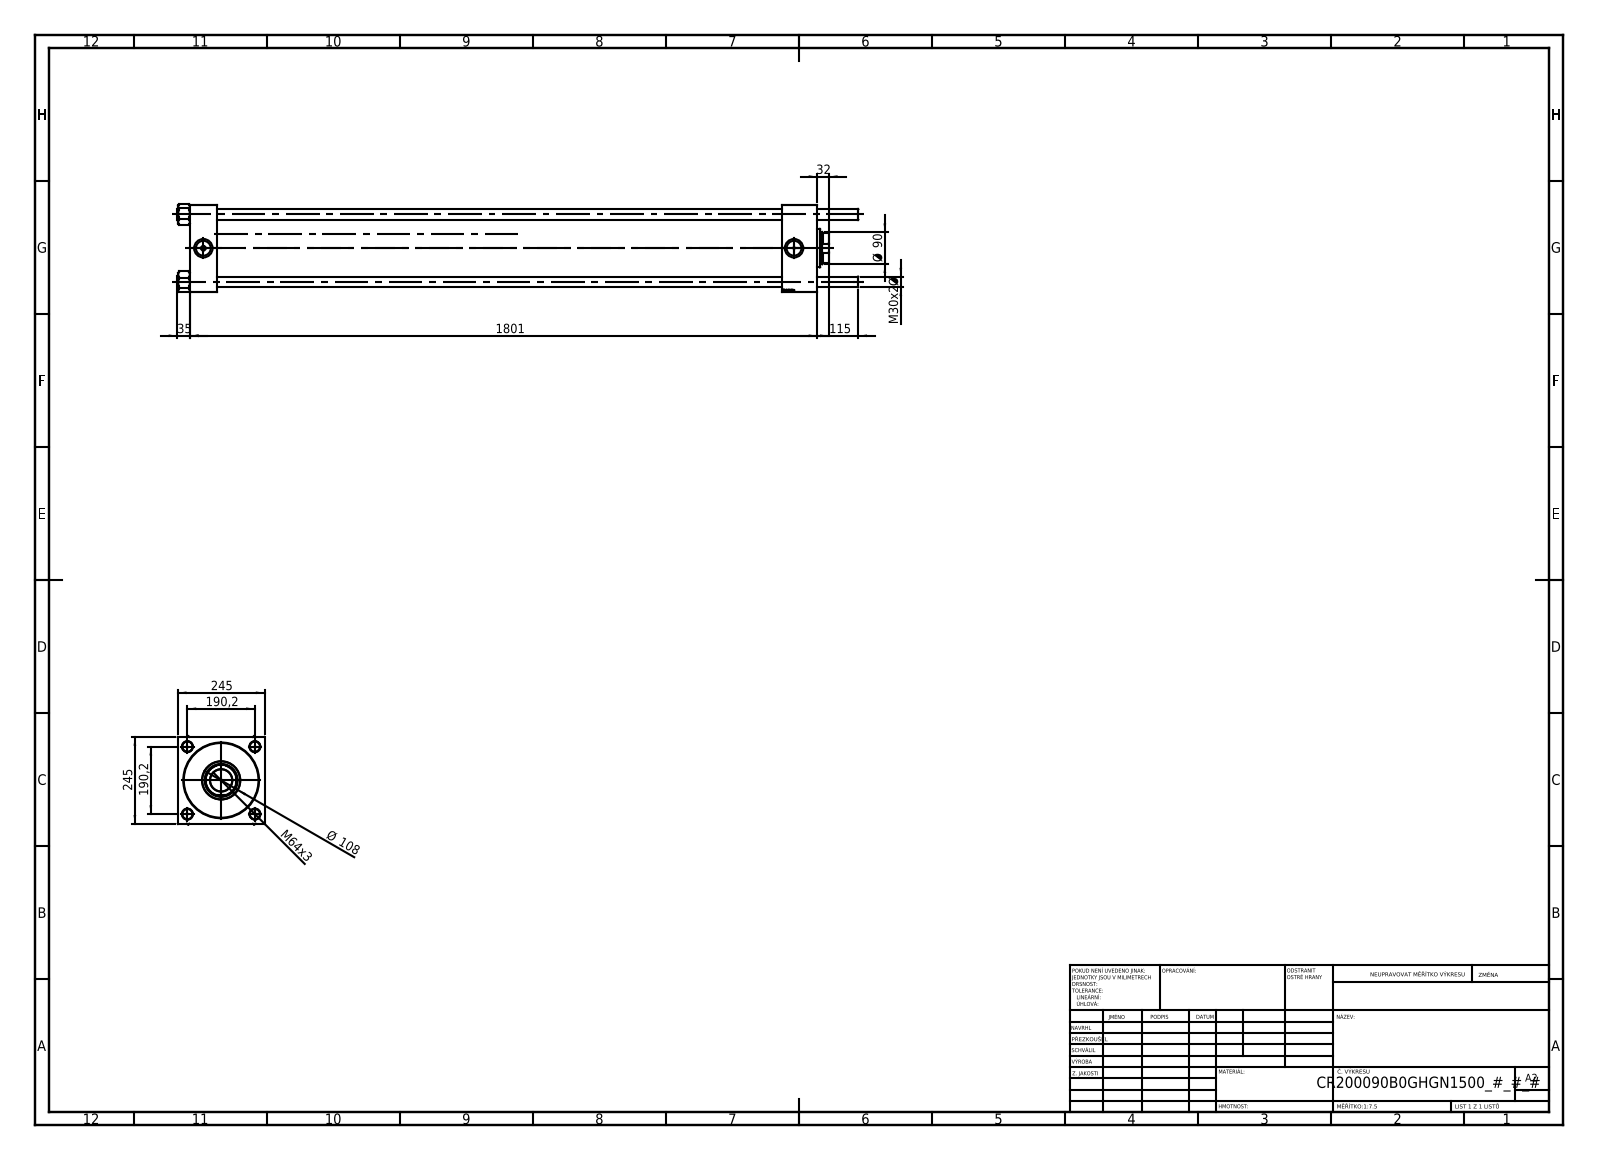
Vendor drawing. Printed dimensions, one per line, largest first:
1801
245
245
190,2
190,2
115
Ø 108
Ø 90
M64x3
35
32
M30x2 Ø
